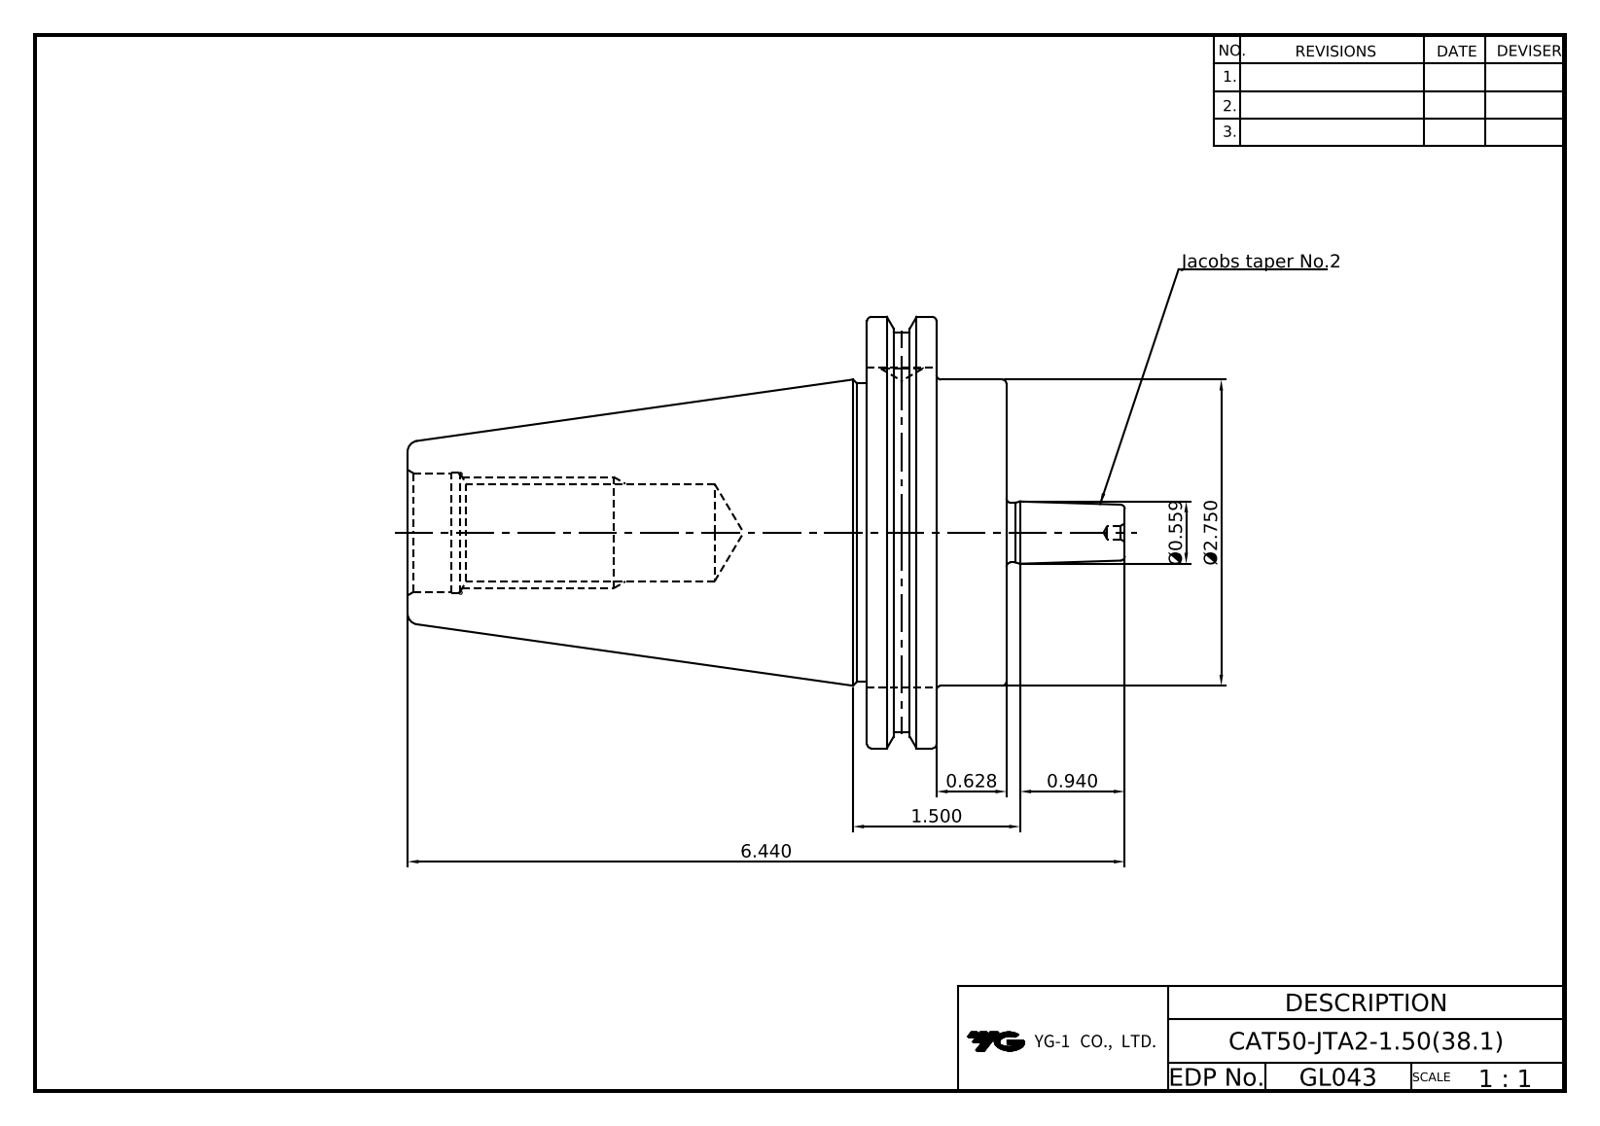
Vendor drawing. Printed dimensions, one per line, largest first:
6.440
Ø2.750
1.500
0.940
0.628
Ø0.559
